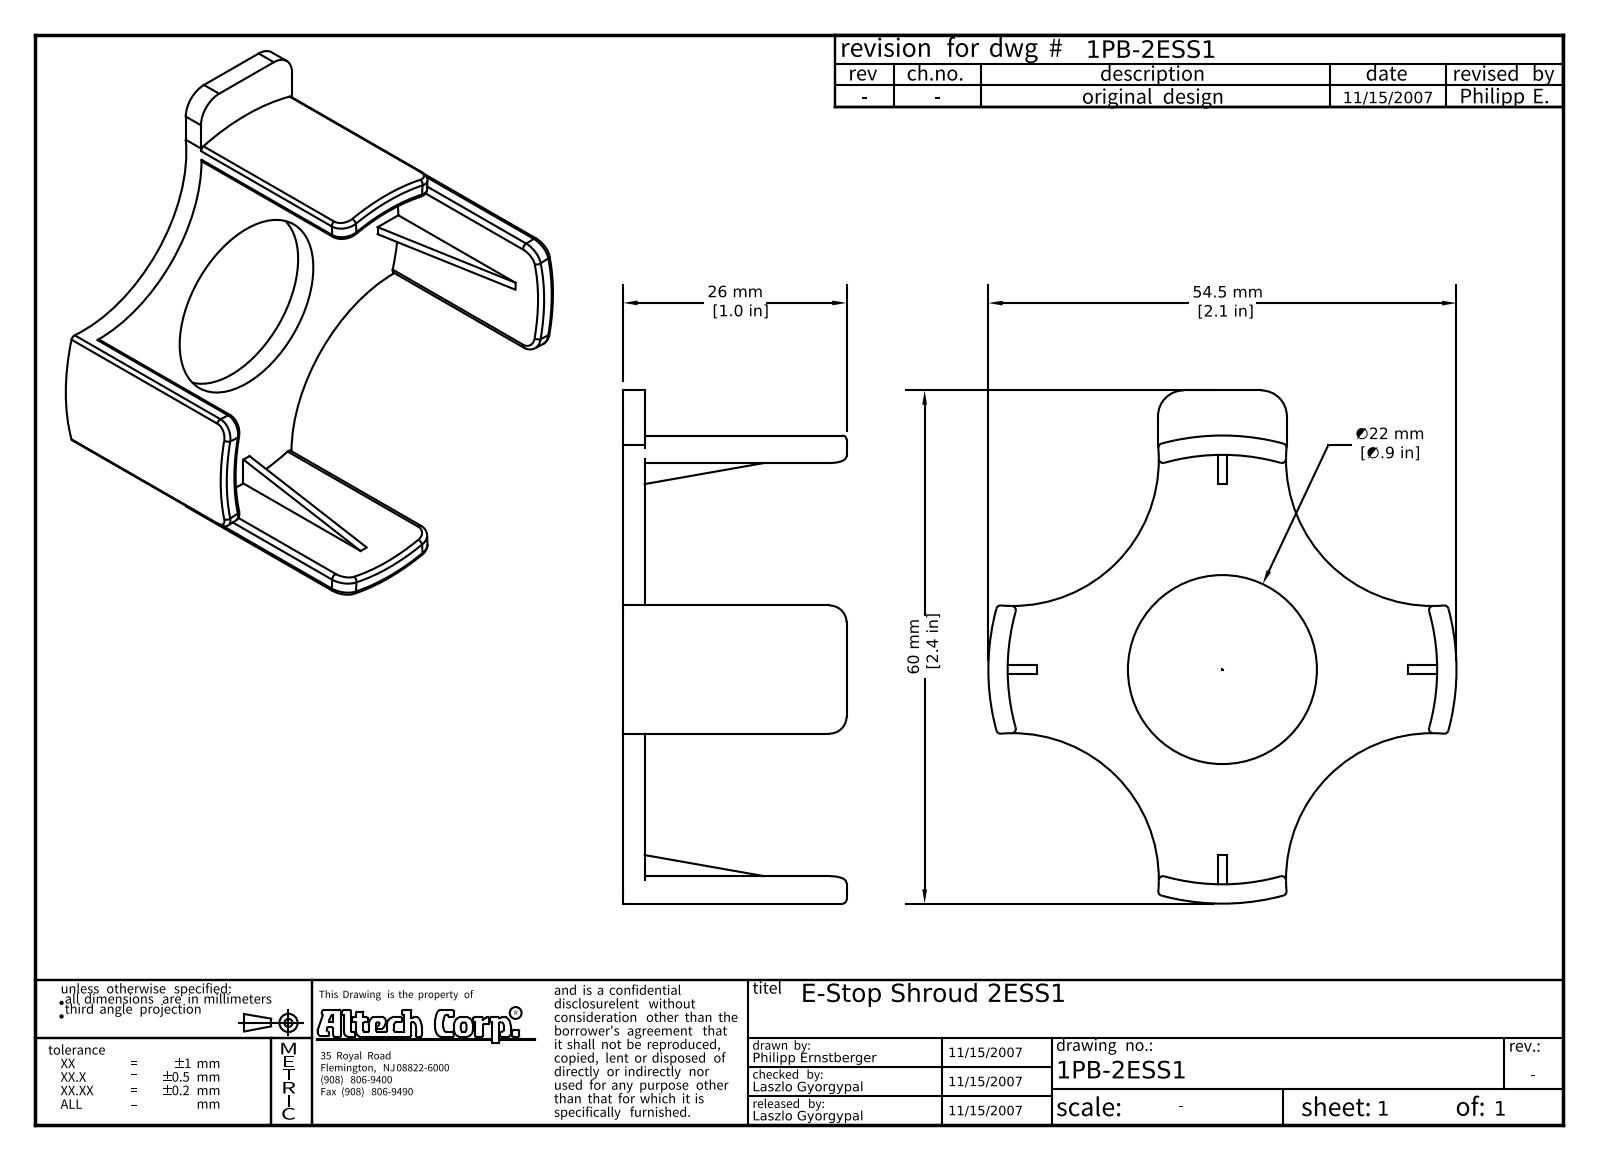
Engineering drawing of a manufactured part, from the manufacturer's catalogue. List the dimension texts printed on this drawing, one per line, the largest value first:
60 mm [2.4 in]
54.5 mm [2.1 in]
26 mm [1.0 in]
∅22 mm [∅.9 in]
